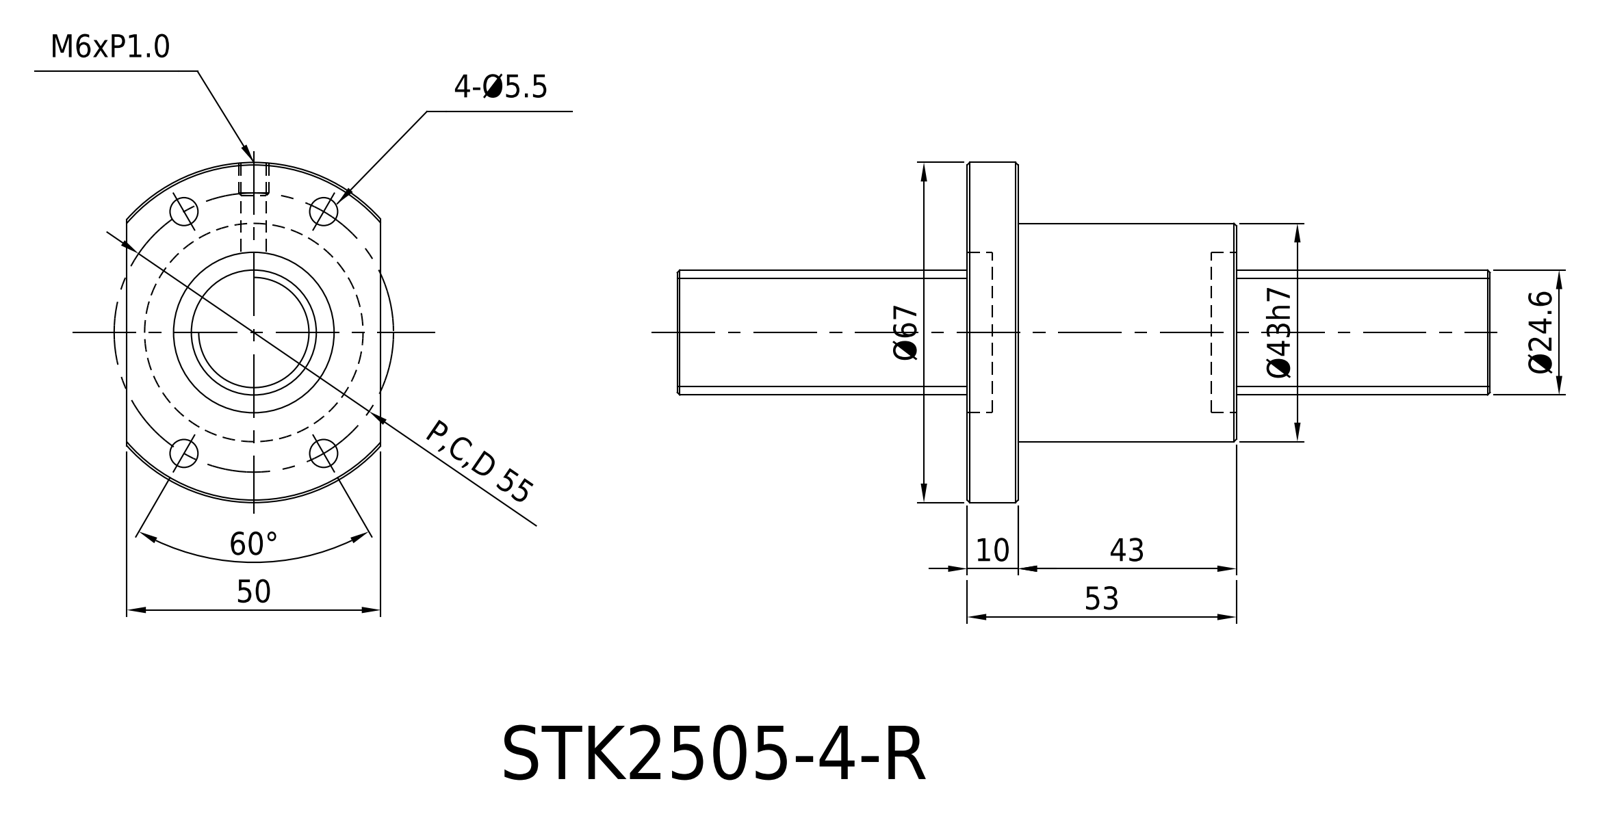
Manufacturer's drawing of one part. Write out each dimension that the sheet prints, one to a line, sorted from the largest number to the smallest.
Ø67
60°
P,C,D 55
53
50
Ø43h7
43
Ø24.6
10
